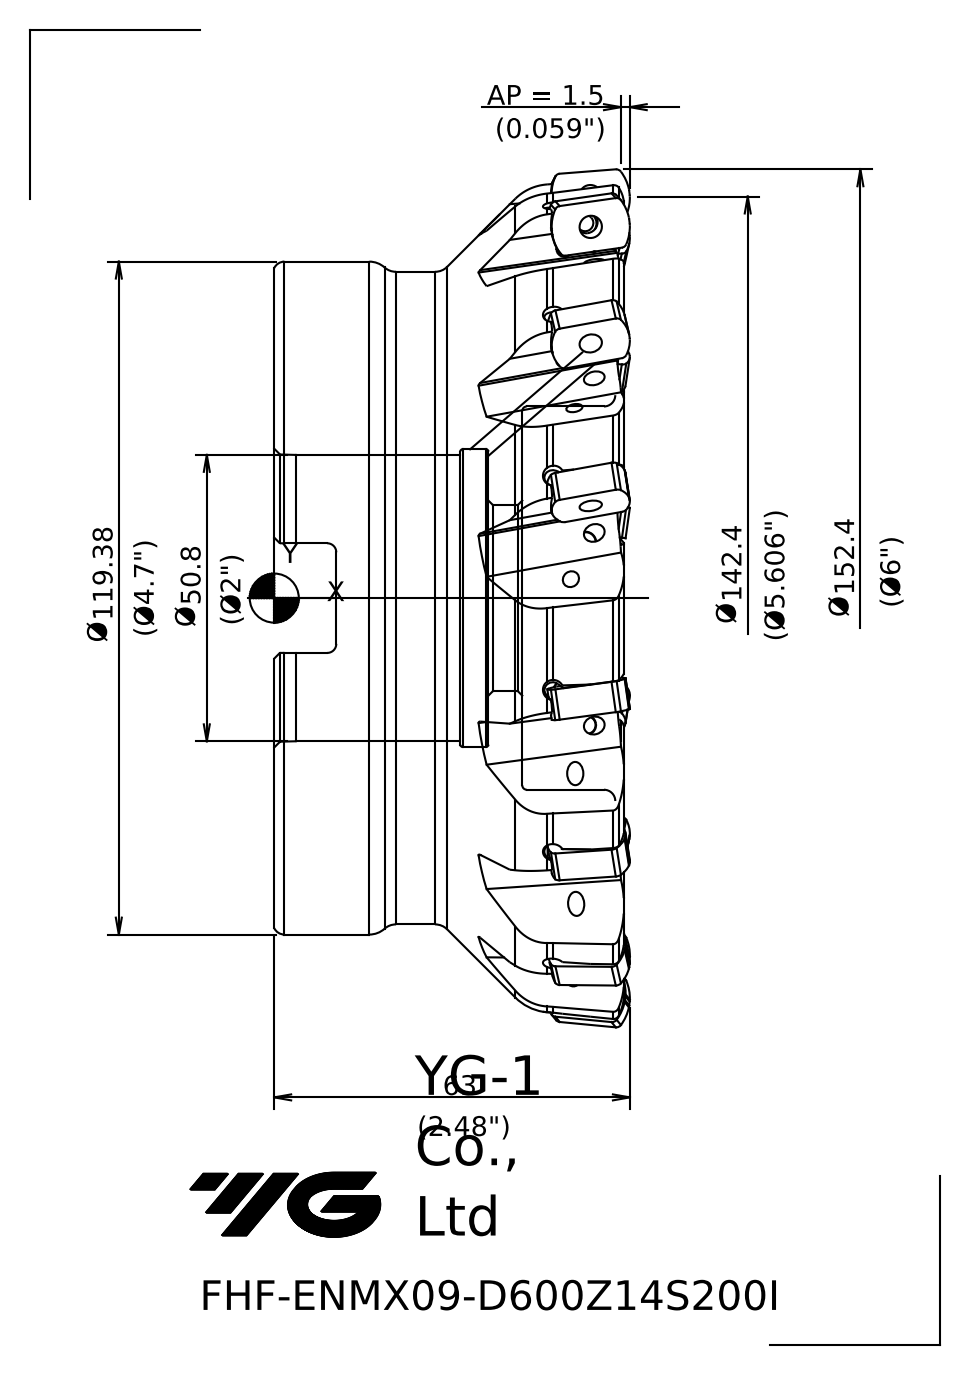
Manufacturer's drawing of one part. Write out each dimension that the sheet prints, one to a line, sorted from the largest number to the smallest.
152.4 Ø
142.4 Ø
63
50.8 Ø
AP = 1.5
